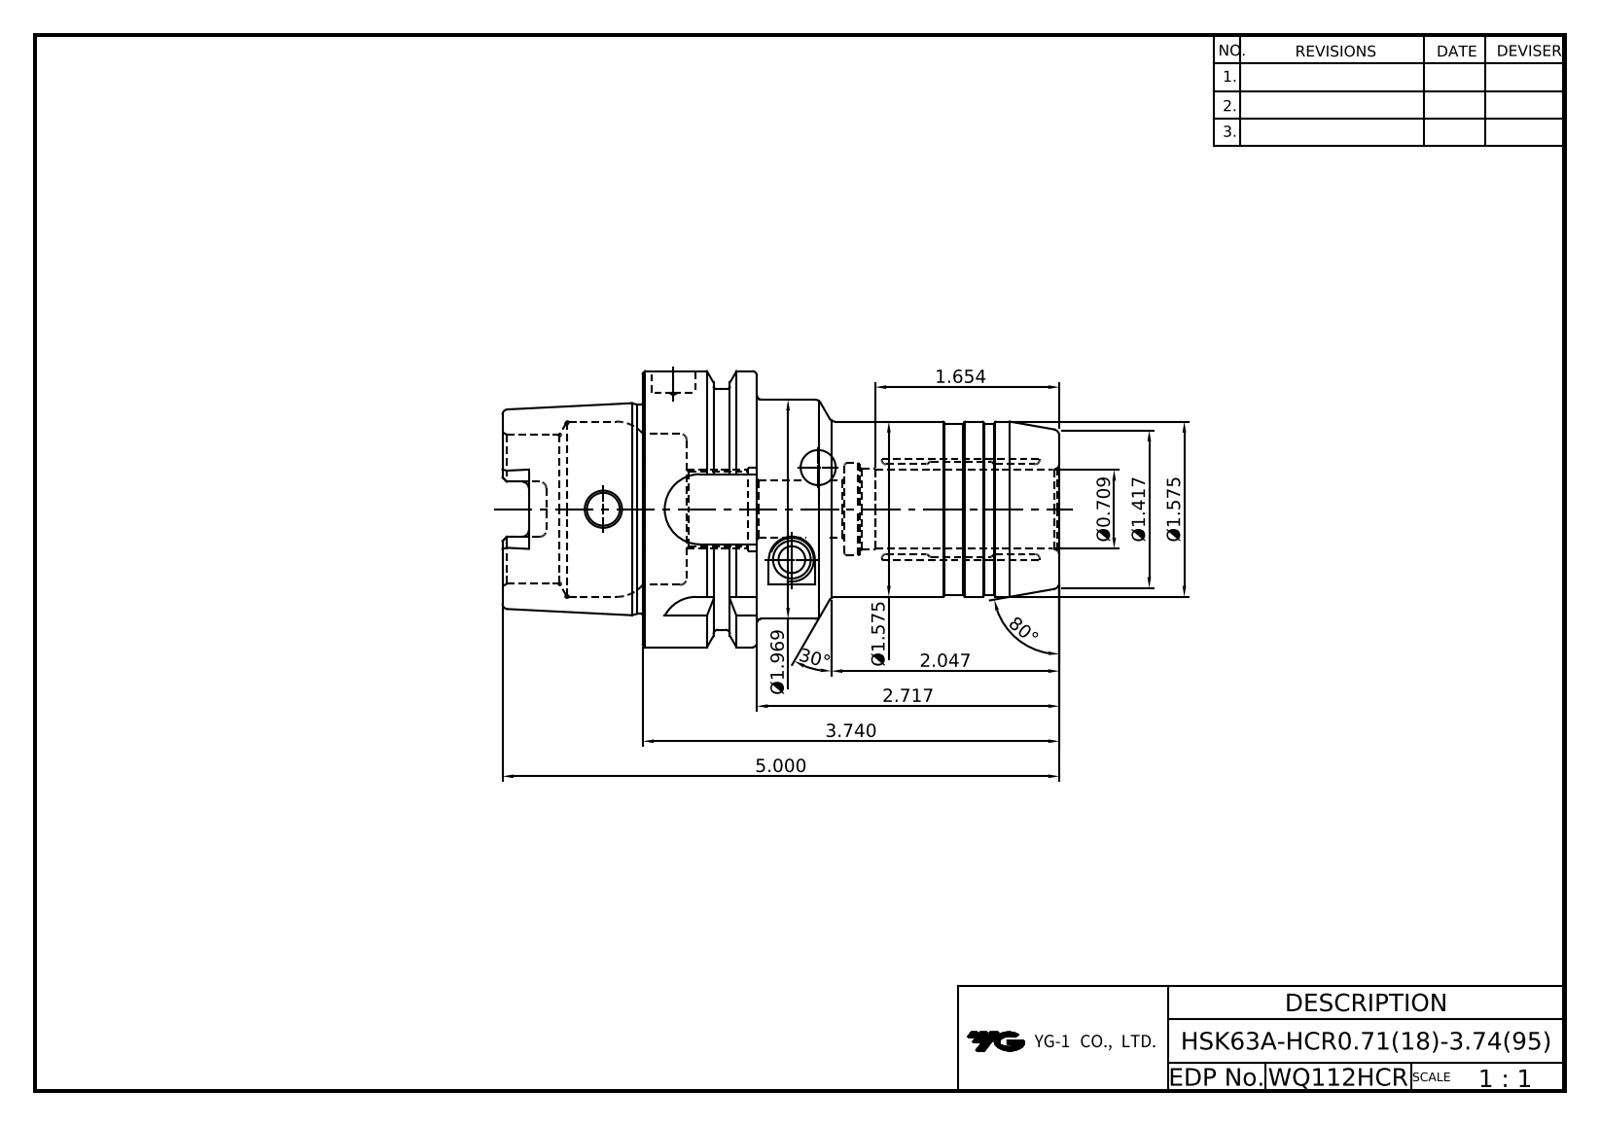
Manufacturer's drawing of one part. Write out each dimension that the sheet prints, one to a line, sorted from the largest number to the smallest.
80°
30°
5.000
3.740
2.717
2.047
Ø1.969
1.654
Ø1.575
Ø1.575
Ø1.417
Ø0.709
